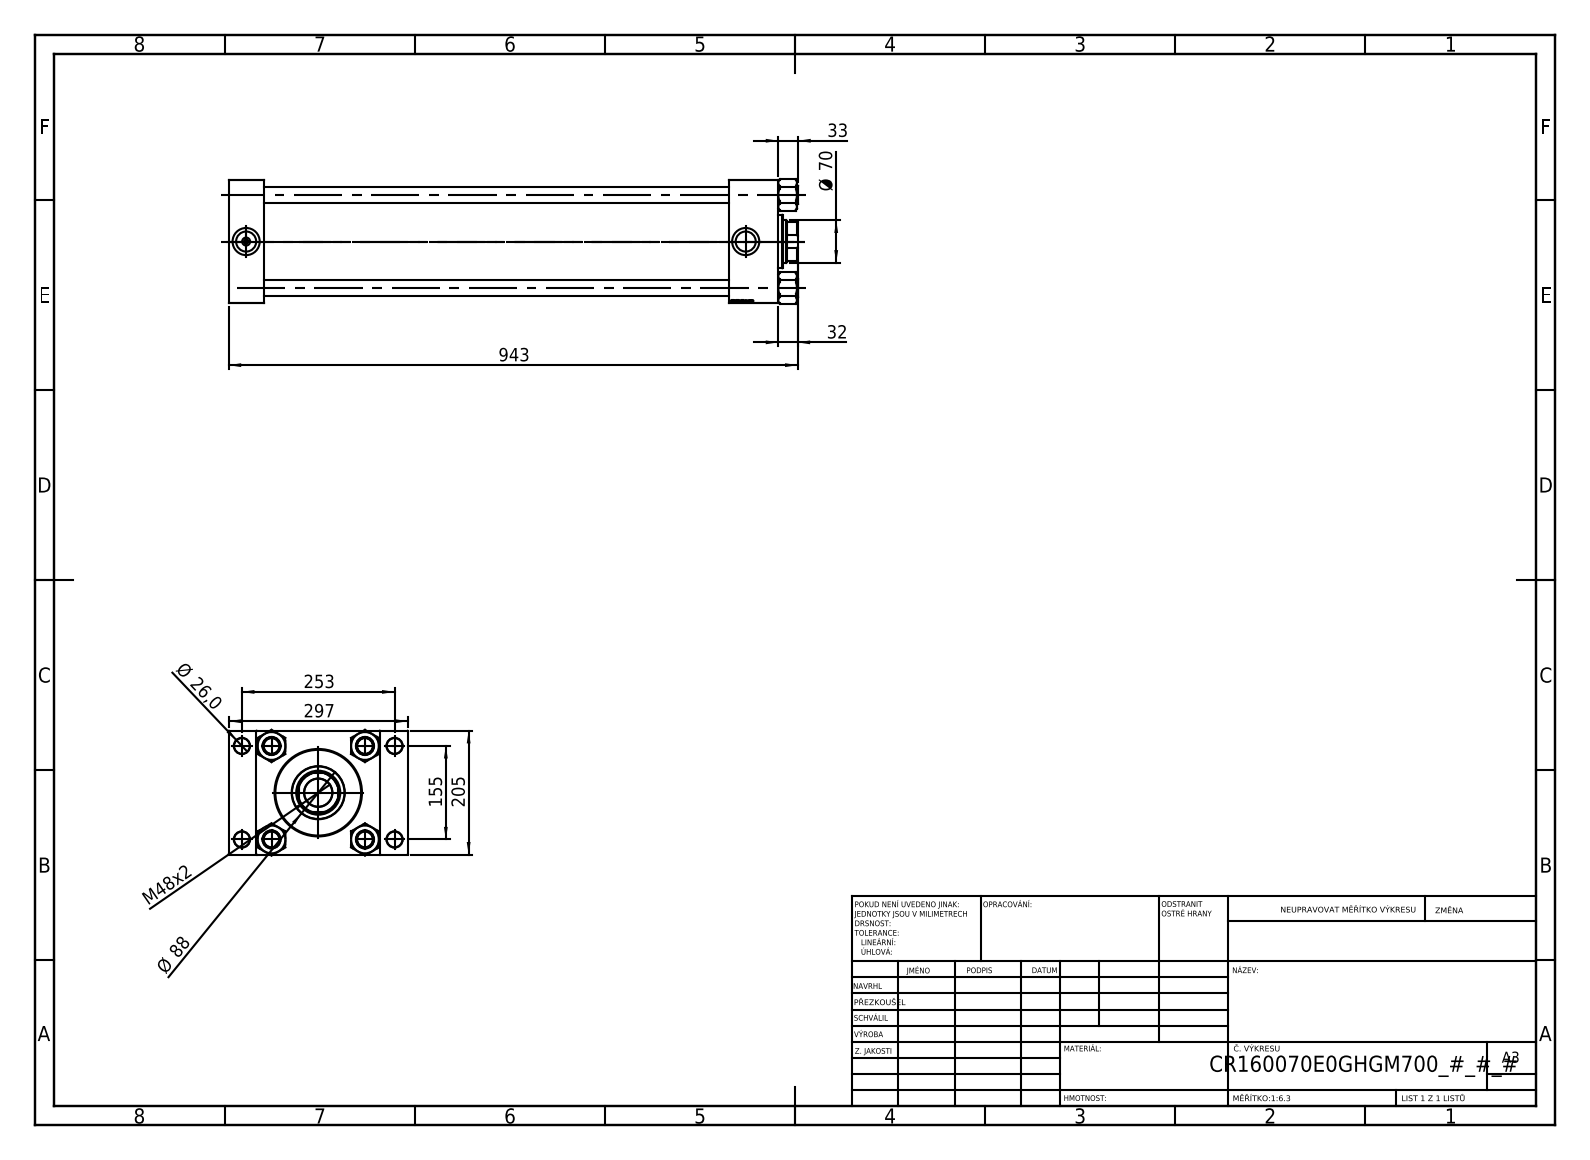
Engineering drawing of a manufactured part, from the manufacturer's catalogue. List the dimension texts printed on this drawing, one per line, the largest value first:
943
297
253
205
155
Ø 88
Ø 70
M48x2
33
32
Ø 26,0
